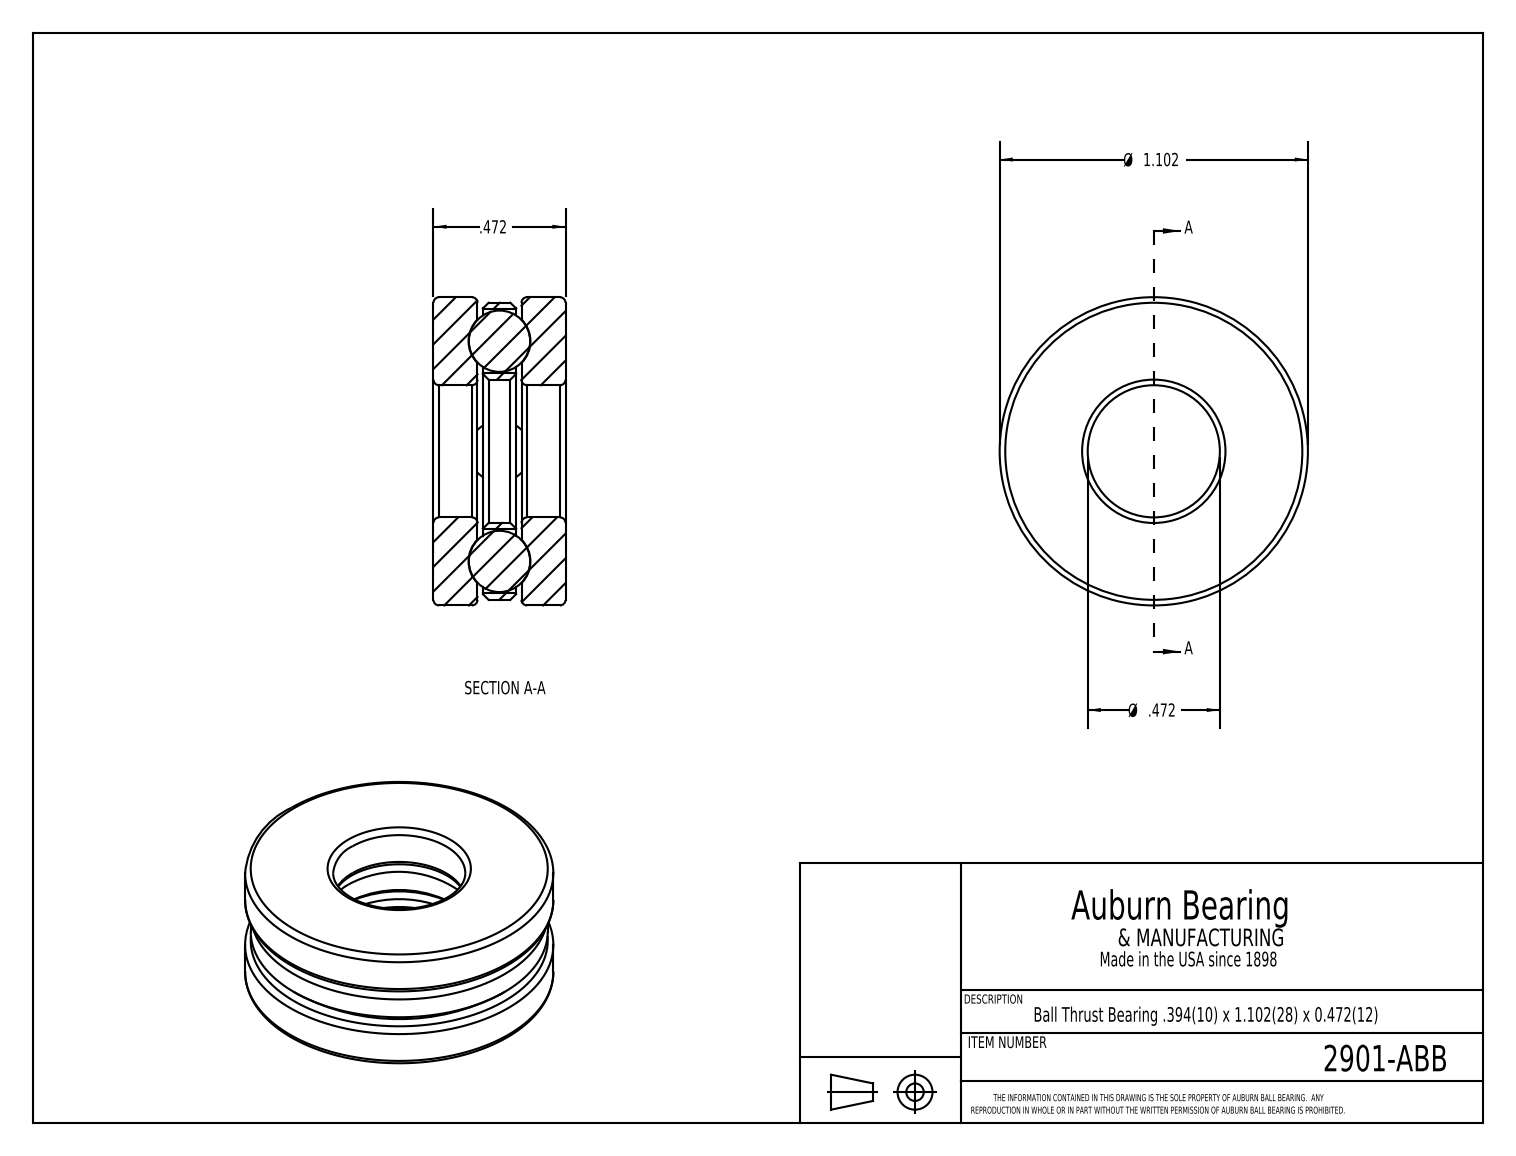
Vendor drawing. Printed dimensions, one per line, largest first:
Ø 1.102
Ø .472
.472
